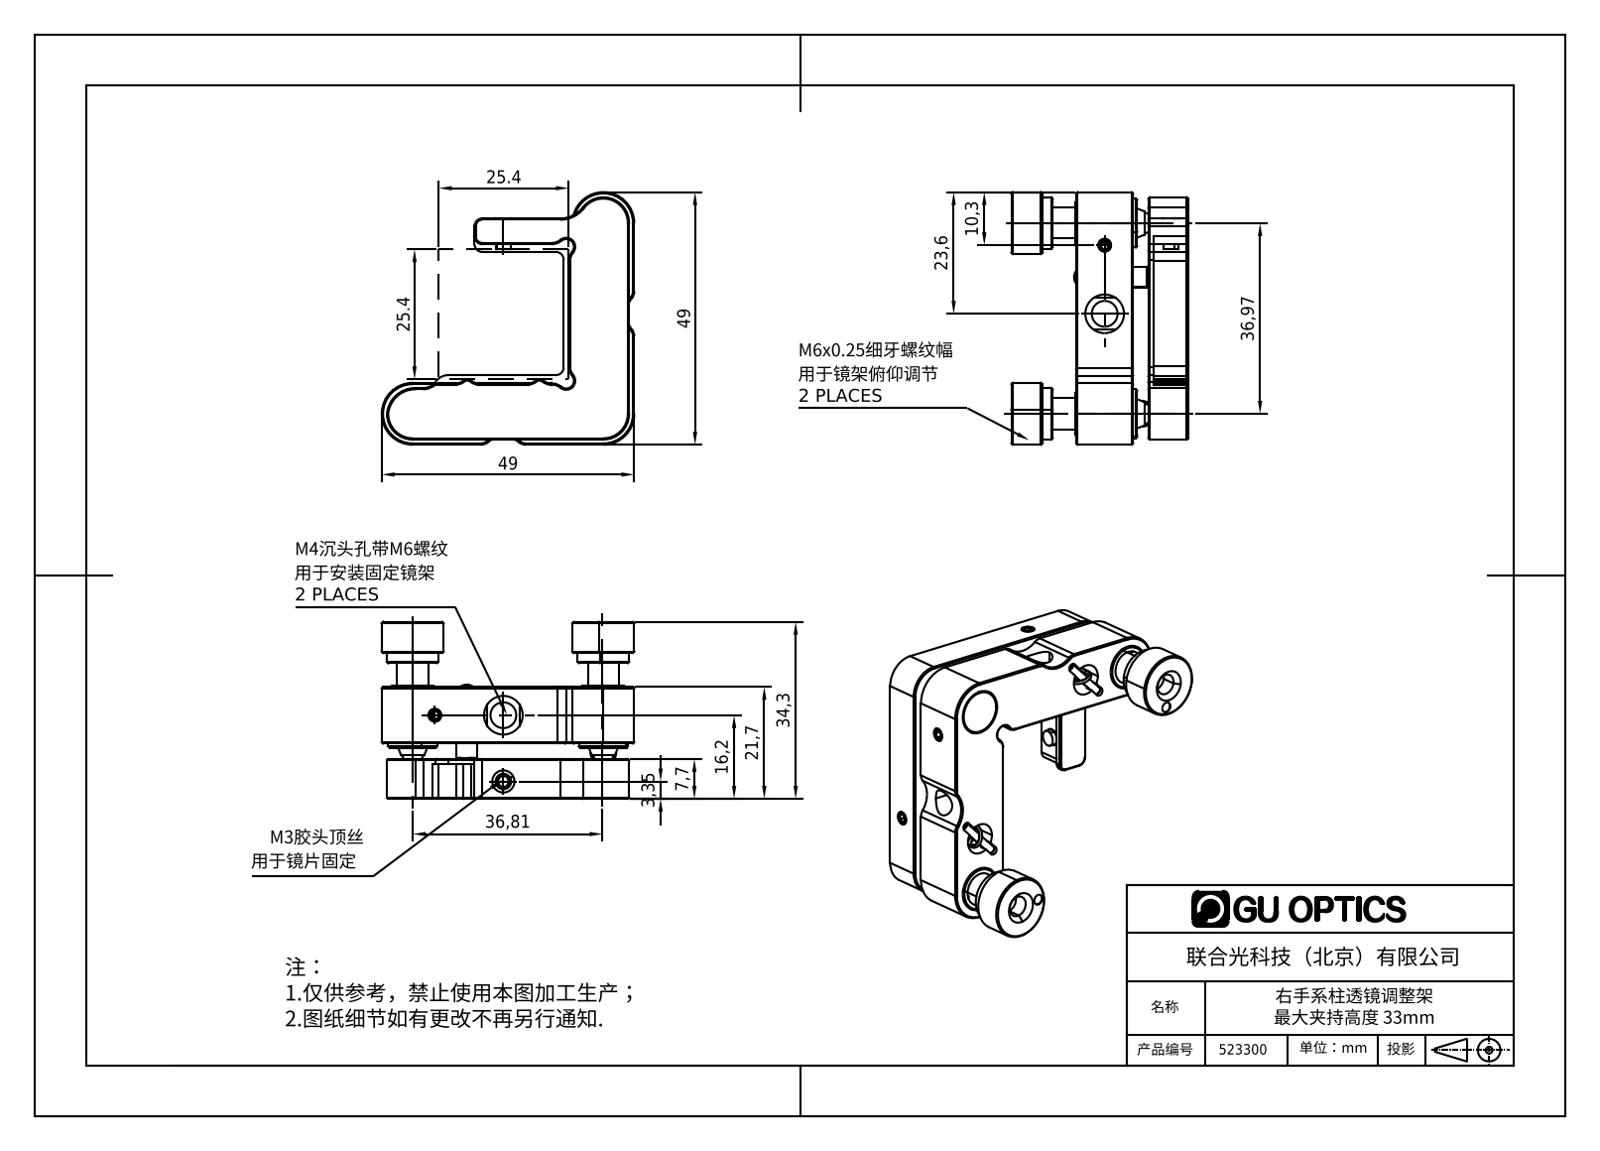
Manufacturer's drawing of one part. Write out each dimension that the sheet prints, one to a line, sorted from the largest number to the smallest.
49
49
36,97
36,81
34,3
25.4
25.4
23,6
21,7
16,2
10,3
7,7
3,35
